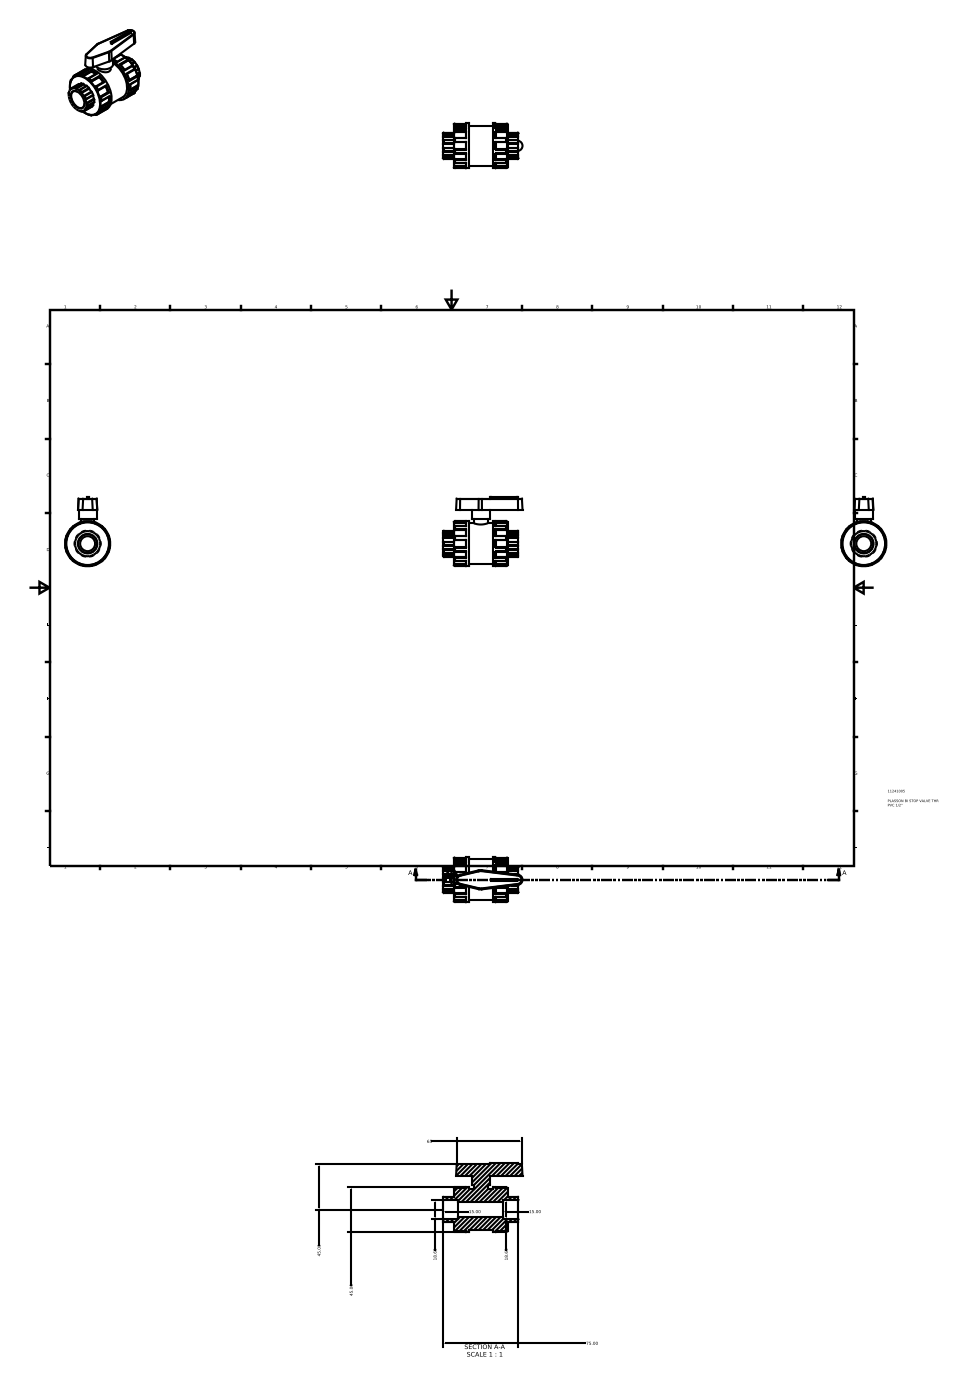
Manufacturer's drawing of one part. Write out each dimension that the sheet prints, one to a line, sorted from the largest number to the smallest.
75.00
65
45.00
45.00
18.63
18.63
15.00
15.00
